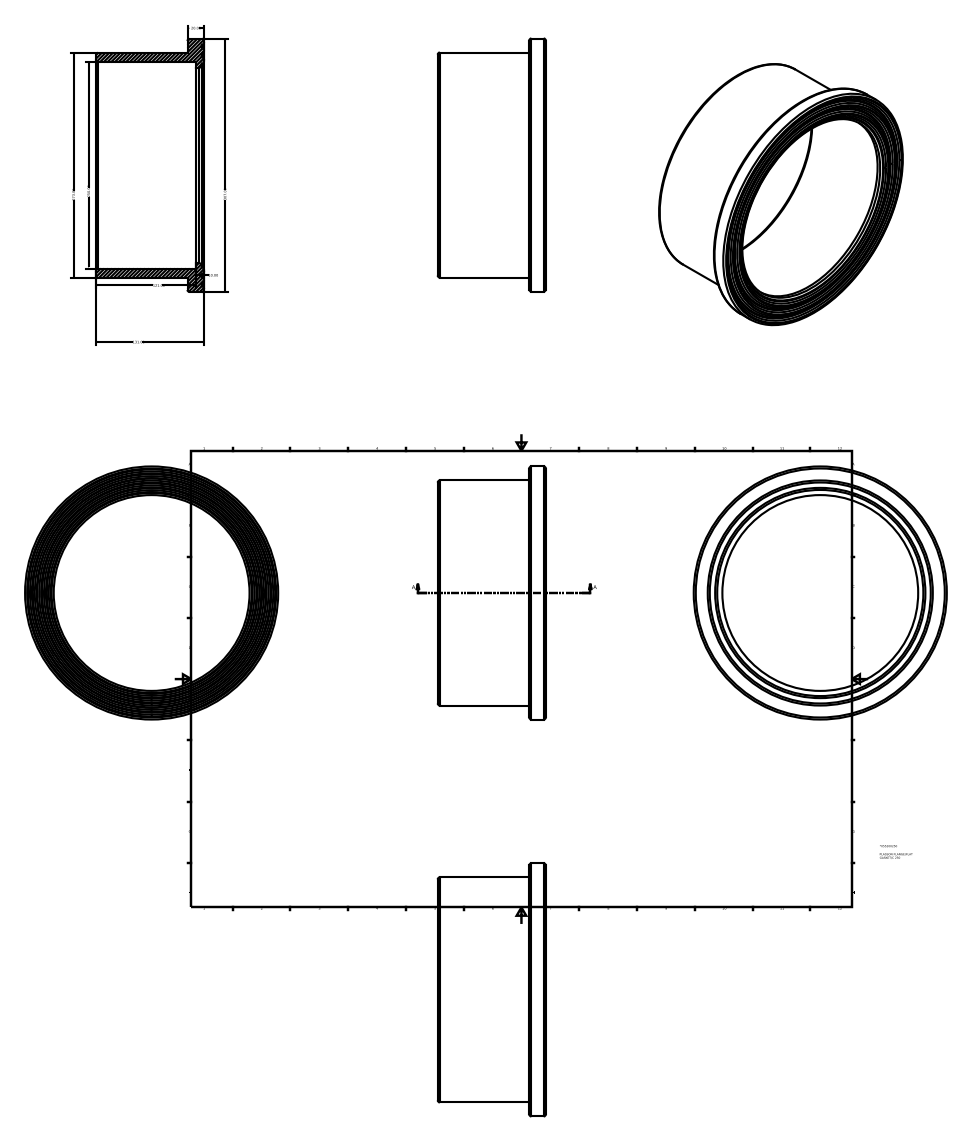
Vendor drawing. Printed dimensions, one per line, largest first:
307.00
273.00
250.00
131.00
121.00
20.00
10.00
